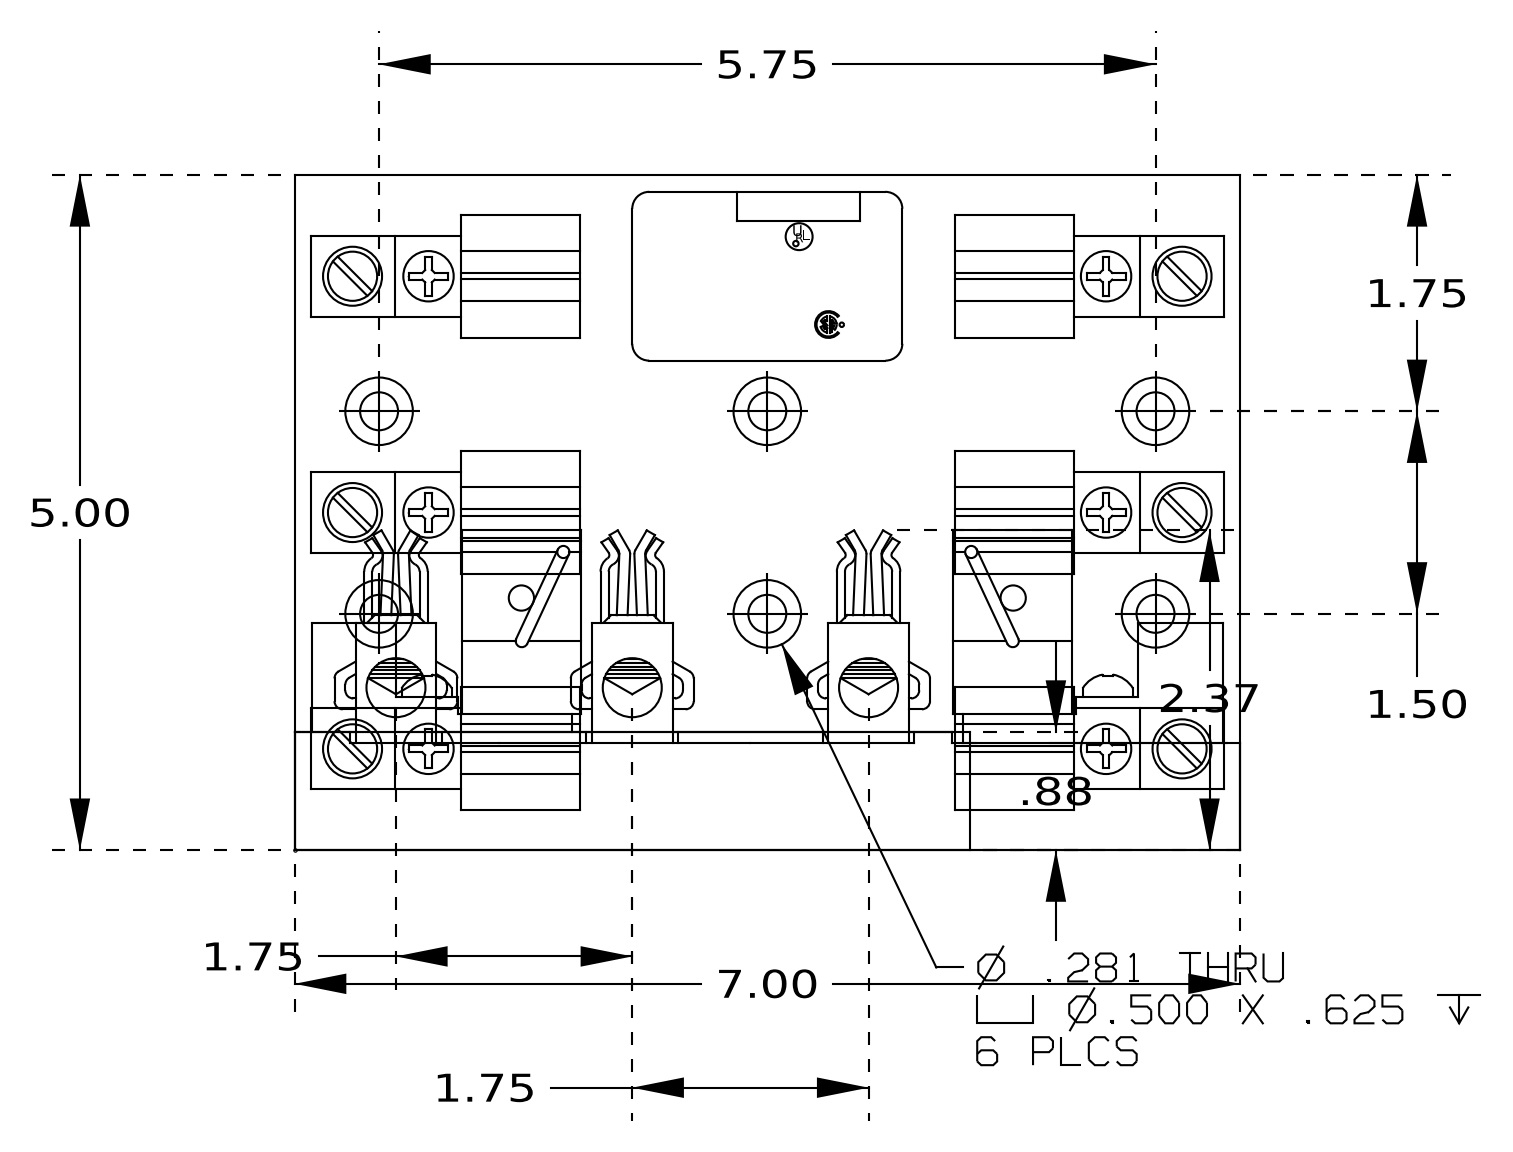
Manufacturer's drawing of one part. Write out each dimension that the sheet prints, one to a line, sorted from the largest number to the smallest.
7.00
5.75
5.00
2.37
1.75
1.75
1.75
1.50
.88
